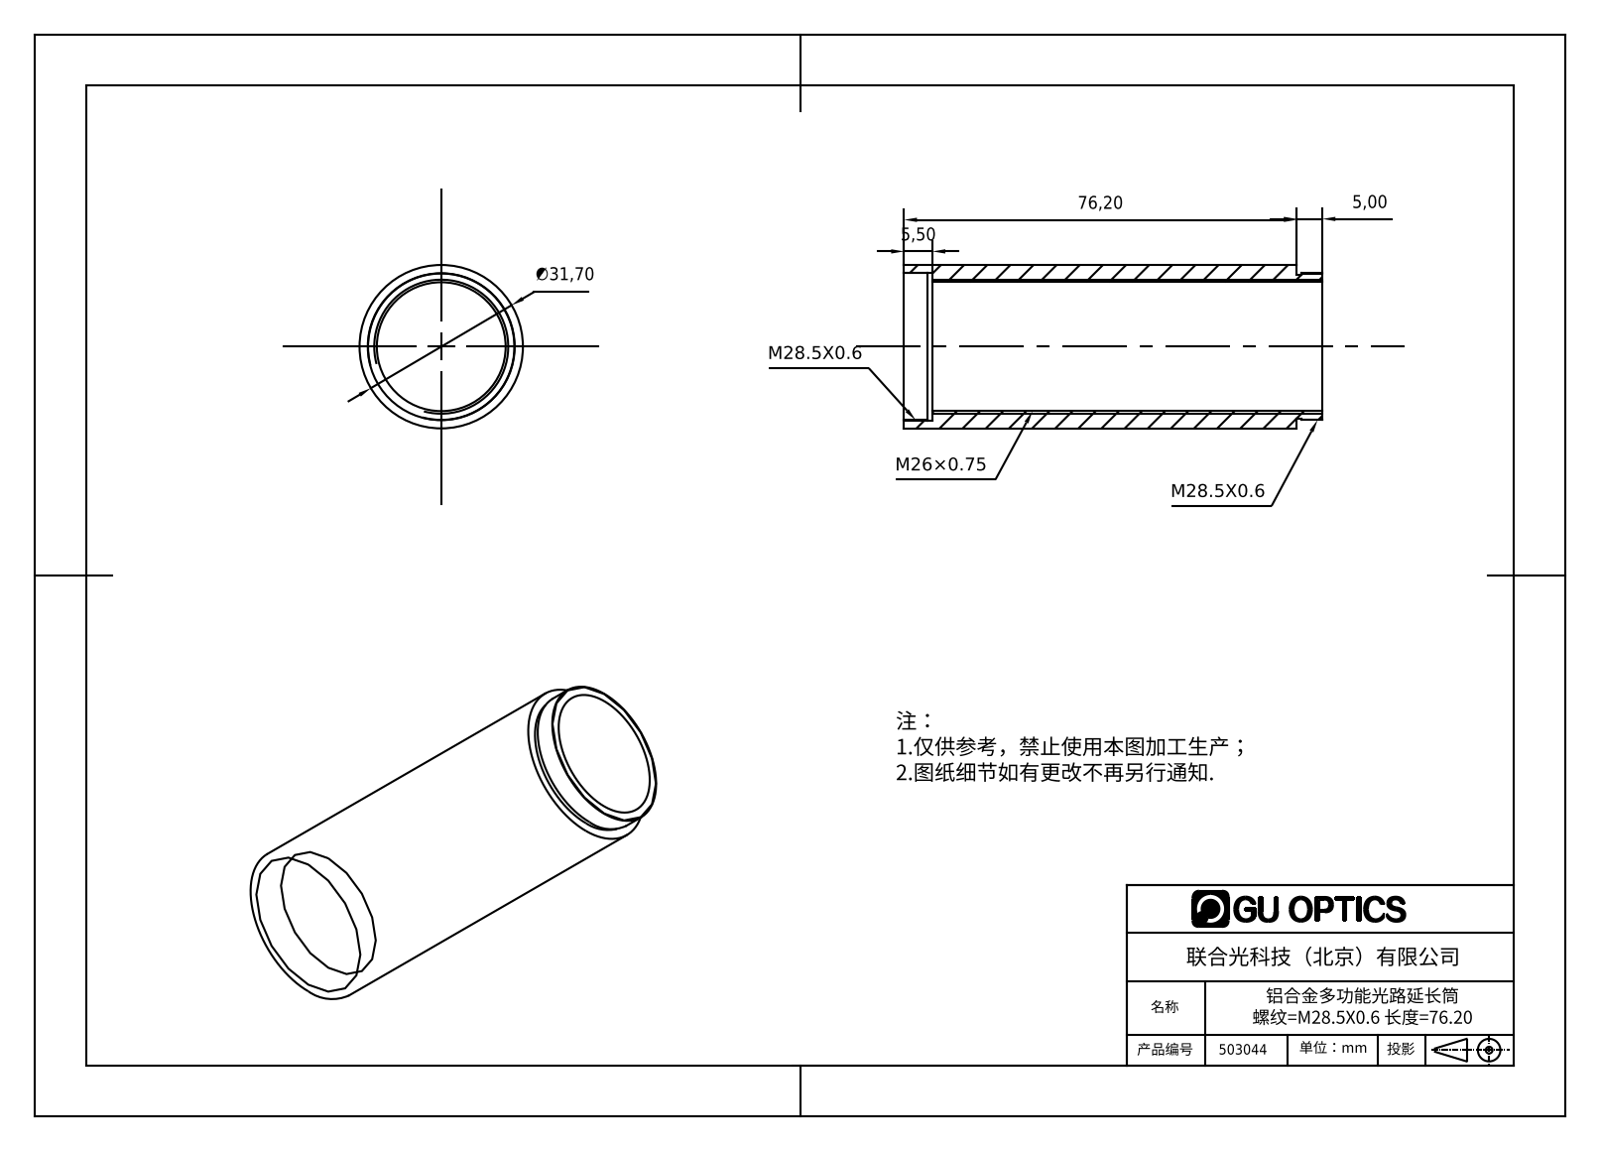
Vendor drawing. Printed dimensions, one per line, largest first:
76,20
∅31,70
5,50
5,00
